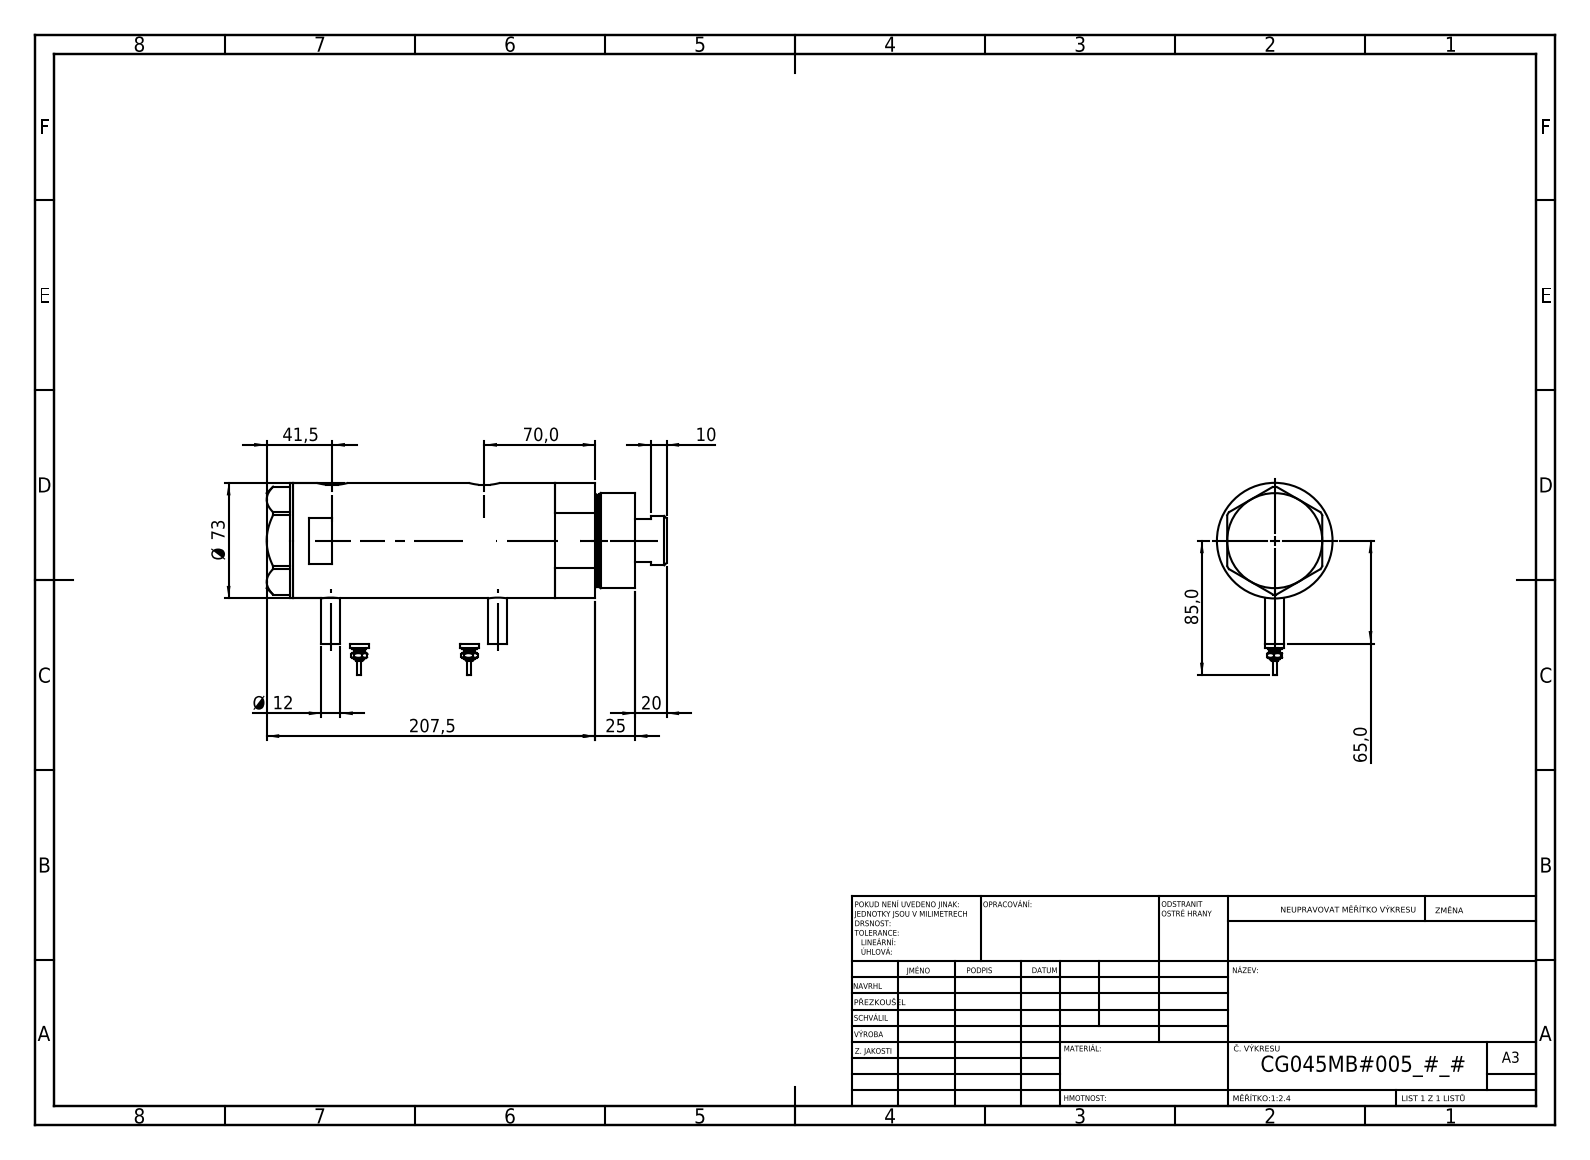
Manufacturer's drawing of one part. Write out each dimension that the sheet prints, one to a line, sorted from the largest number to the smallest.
207,5
85,0
Ø 73
70,0
65,0
41,5
25
20
Ø 12
10
